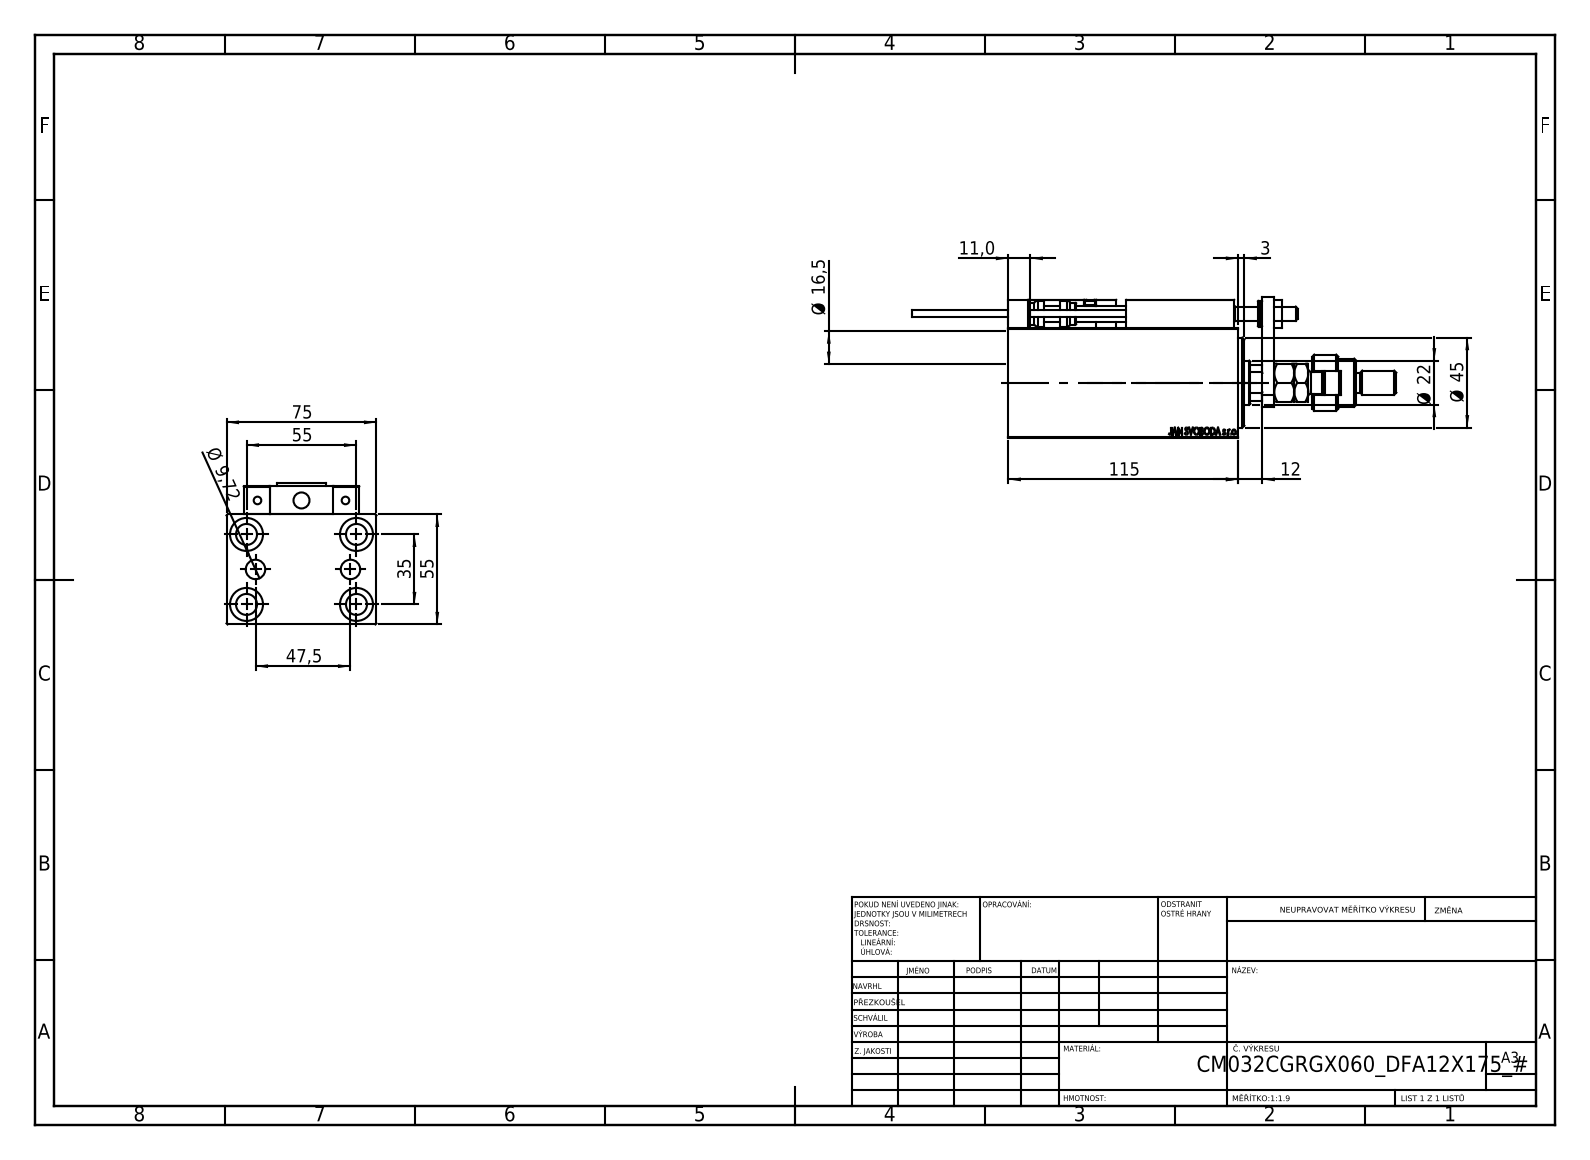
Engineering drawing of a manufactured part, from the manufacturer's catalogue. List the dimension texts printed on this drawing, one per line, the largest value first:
115
75
55
55
47,5
Ø 45
35
Ø 22
Ø 16,5
12
11,0
Ø 9,72
3
